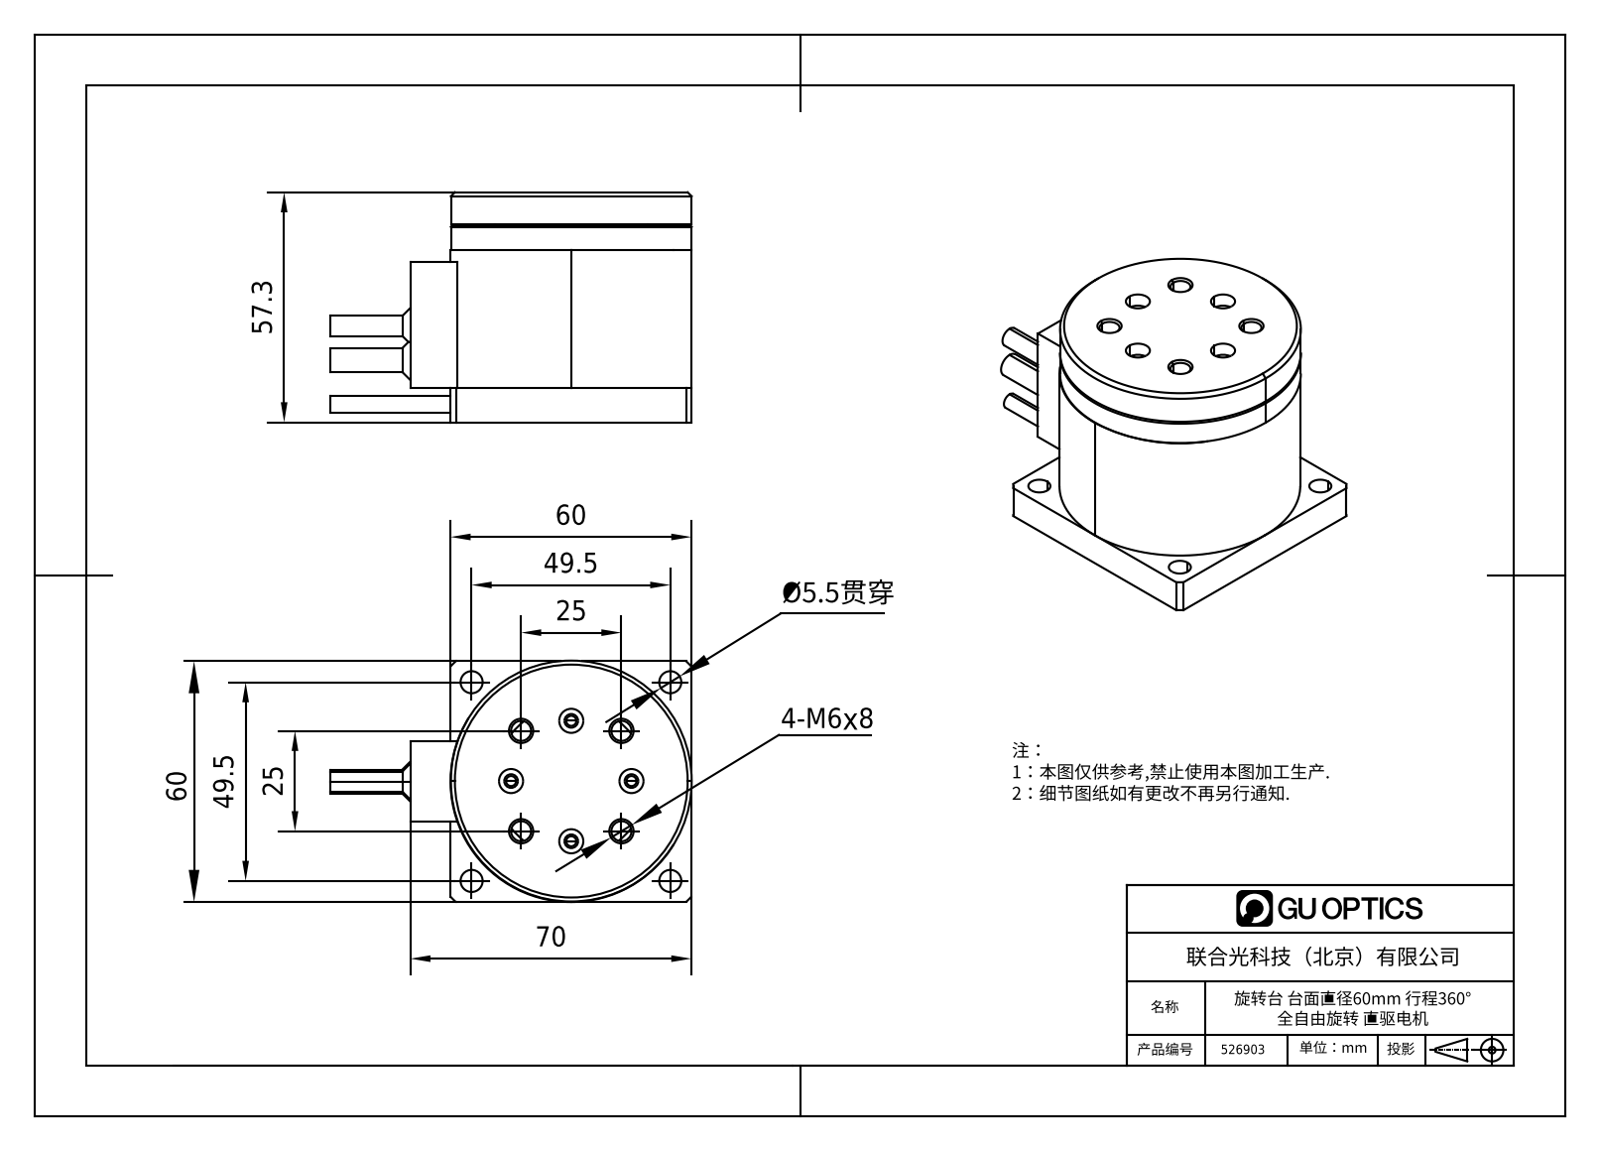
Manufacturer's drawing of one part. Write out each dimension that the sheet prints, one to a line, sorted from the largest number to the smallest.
70
60
60
57.3
49.5
49.5
25
25
4-M6x8
Ø5.5贯穿
